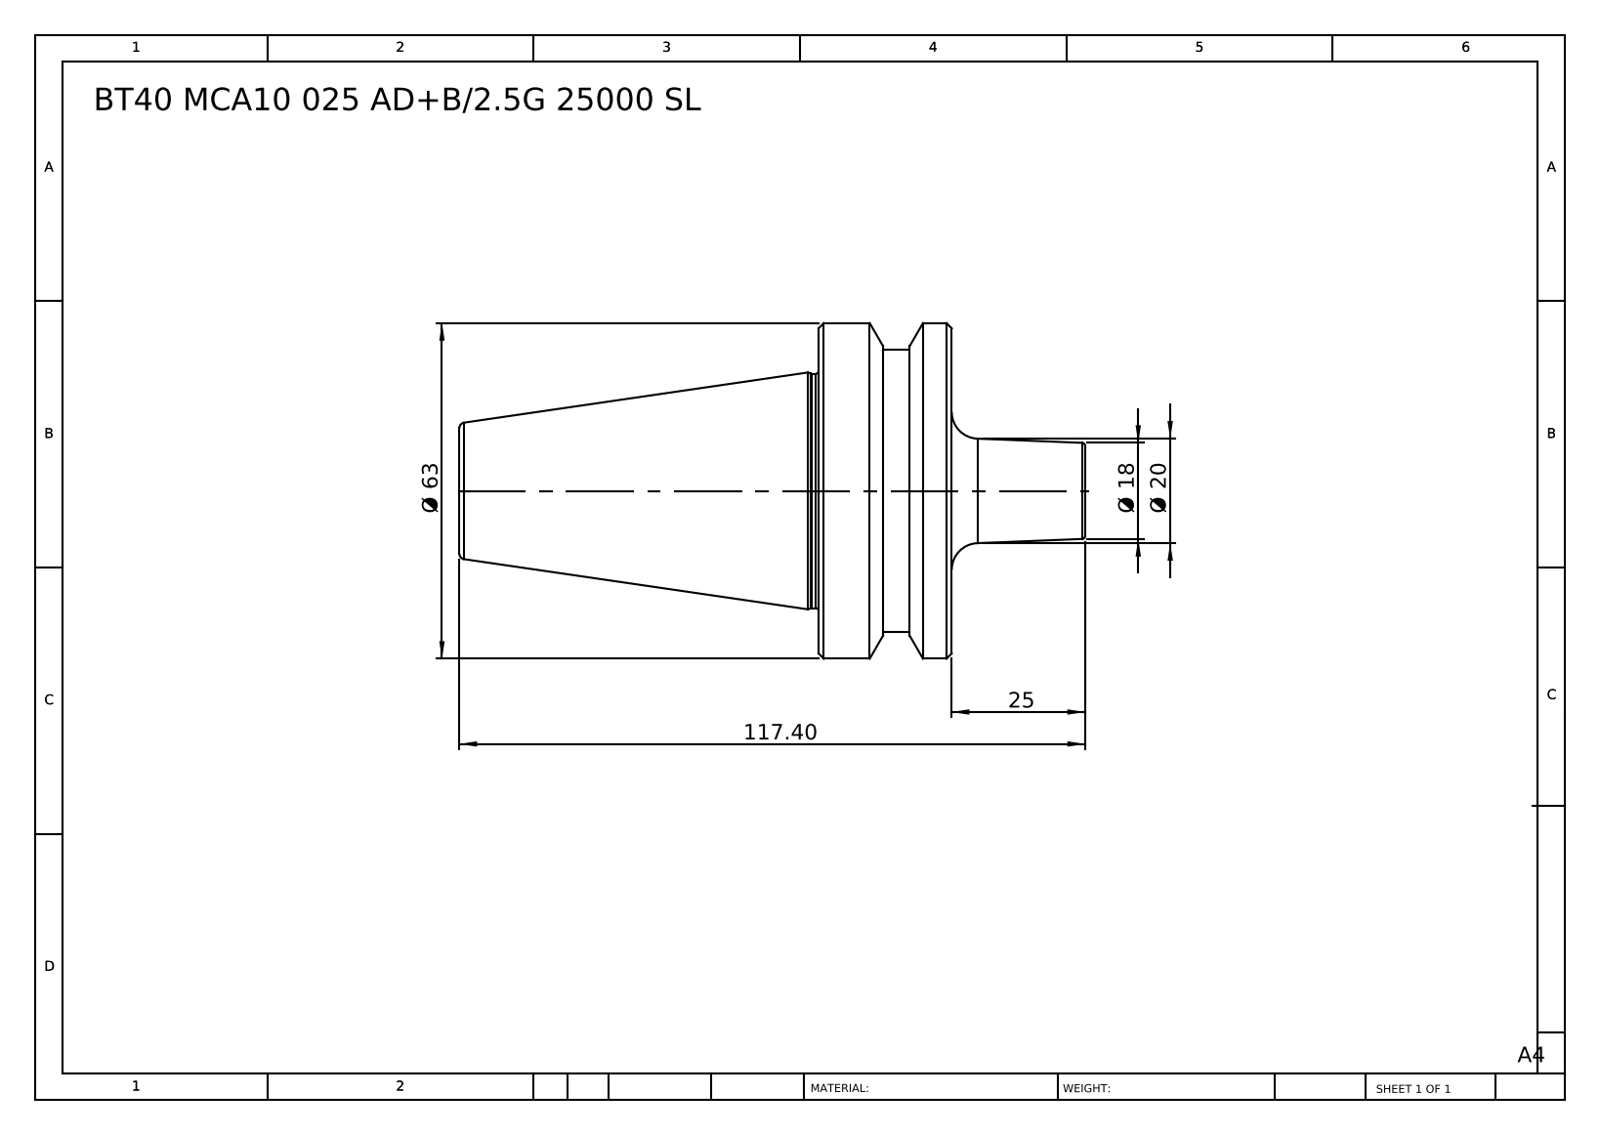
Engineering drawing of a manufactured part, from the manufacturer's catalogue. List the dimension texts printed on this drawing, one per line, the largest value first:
117.40
Ø 63
25
Ø 20
Ø 18
